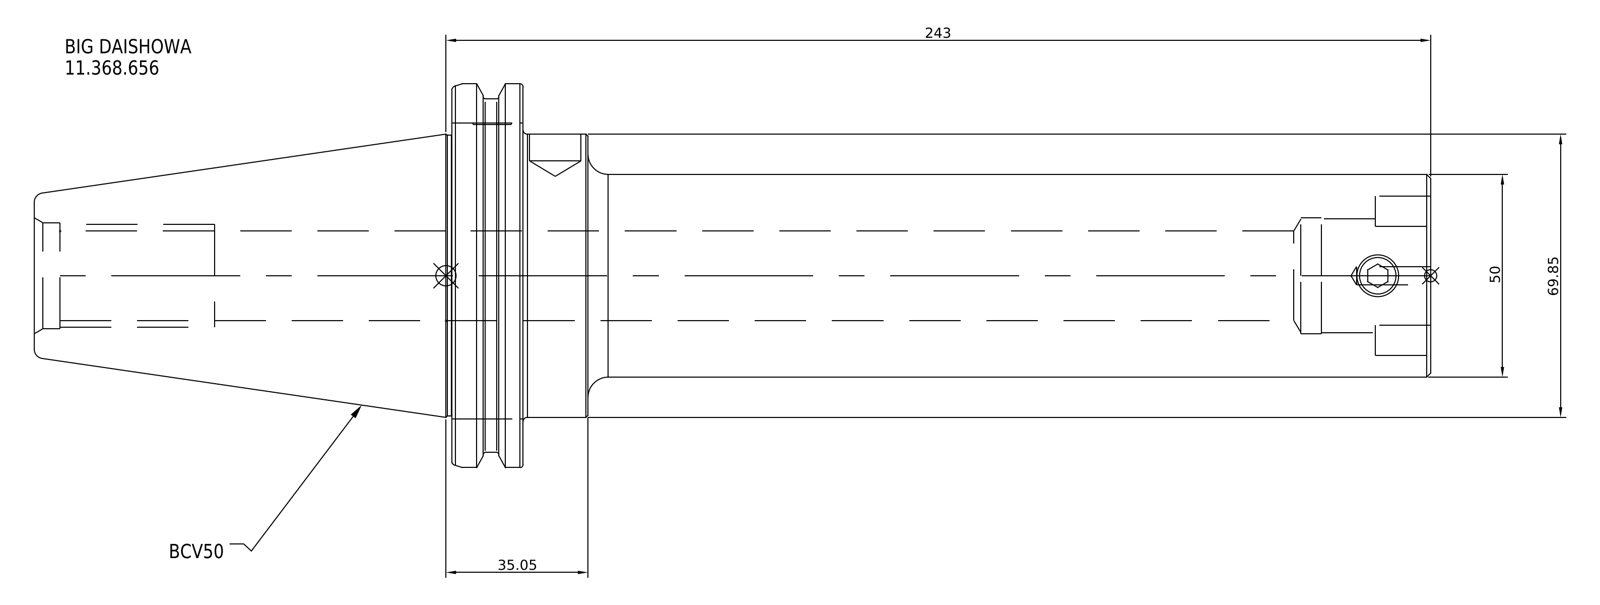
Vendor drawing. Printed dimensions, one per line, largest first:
243
69.85
50
35.05
